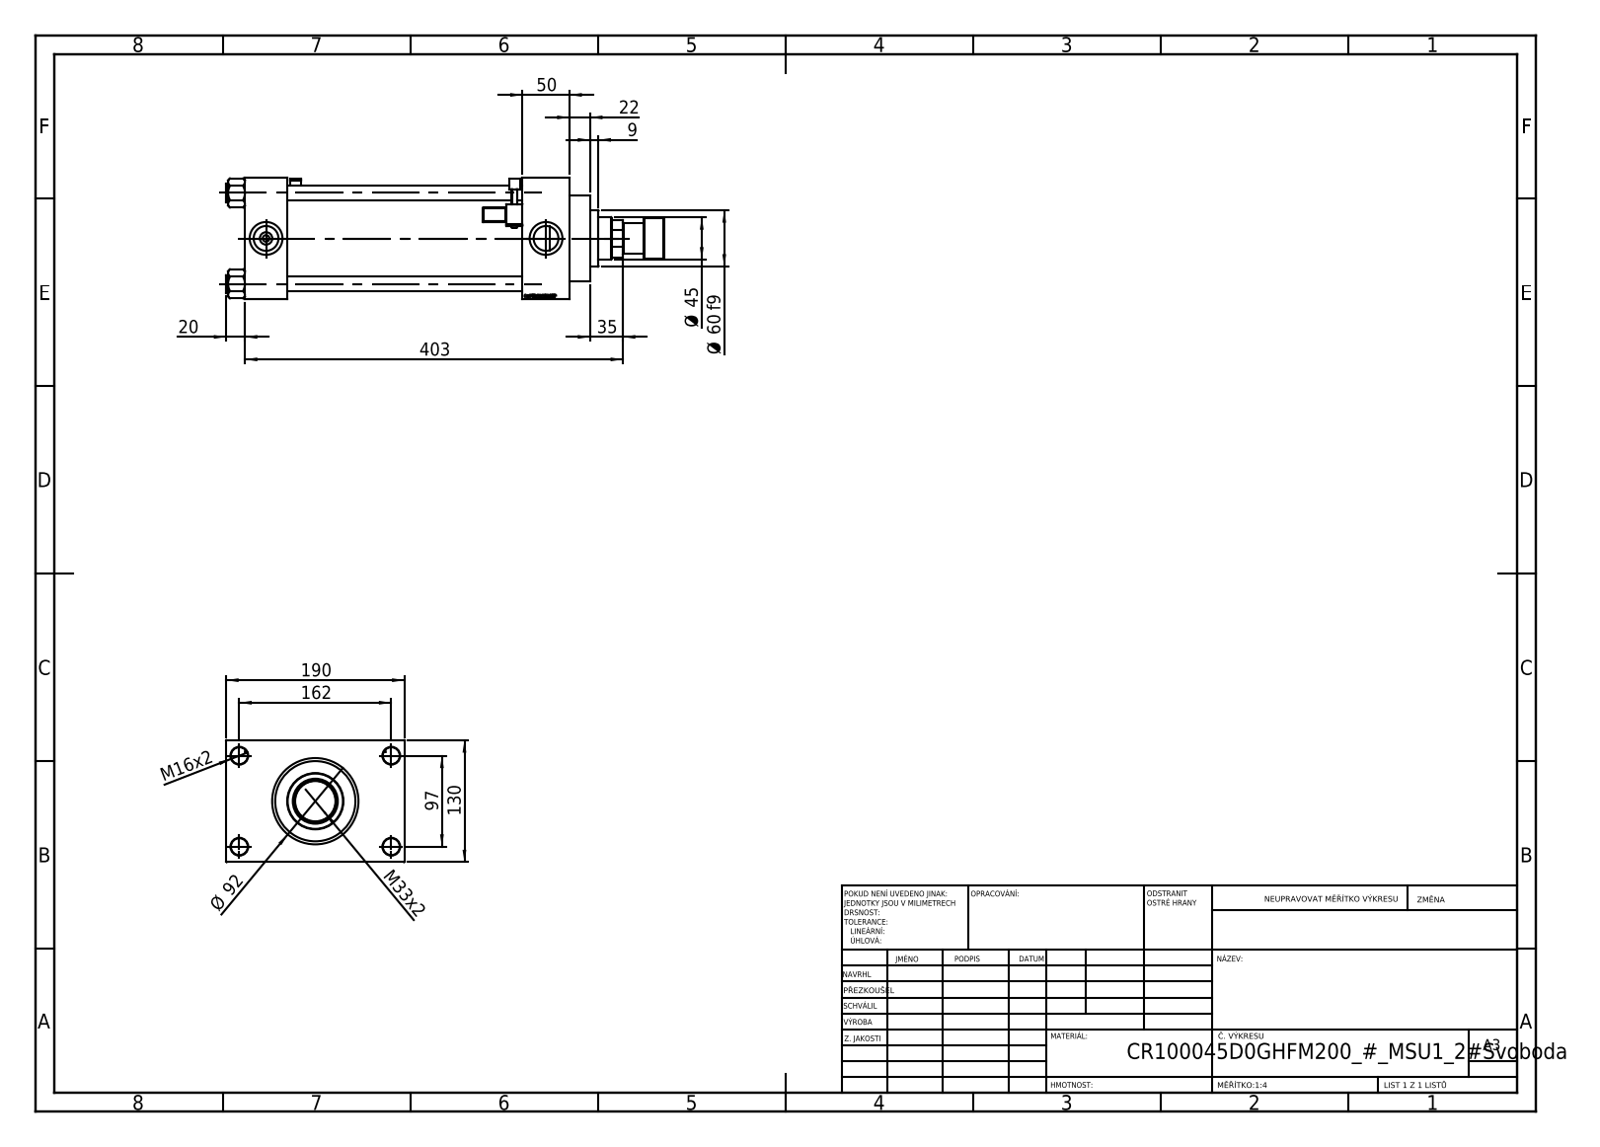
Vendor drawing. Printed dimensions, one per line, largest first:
403
190
162
130
97
Ø 92
Ø 60 f9
50
Ø 45
35
M33x2
22
20
M16x2
9
